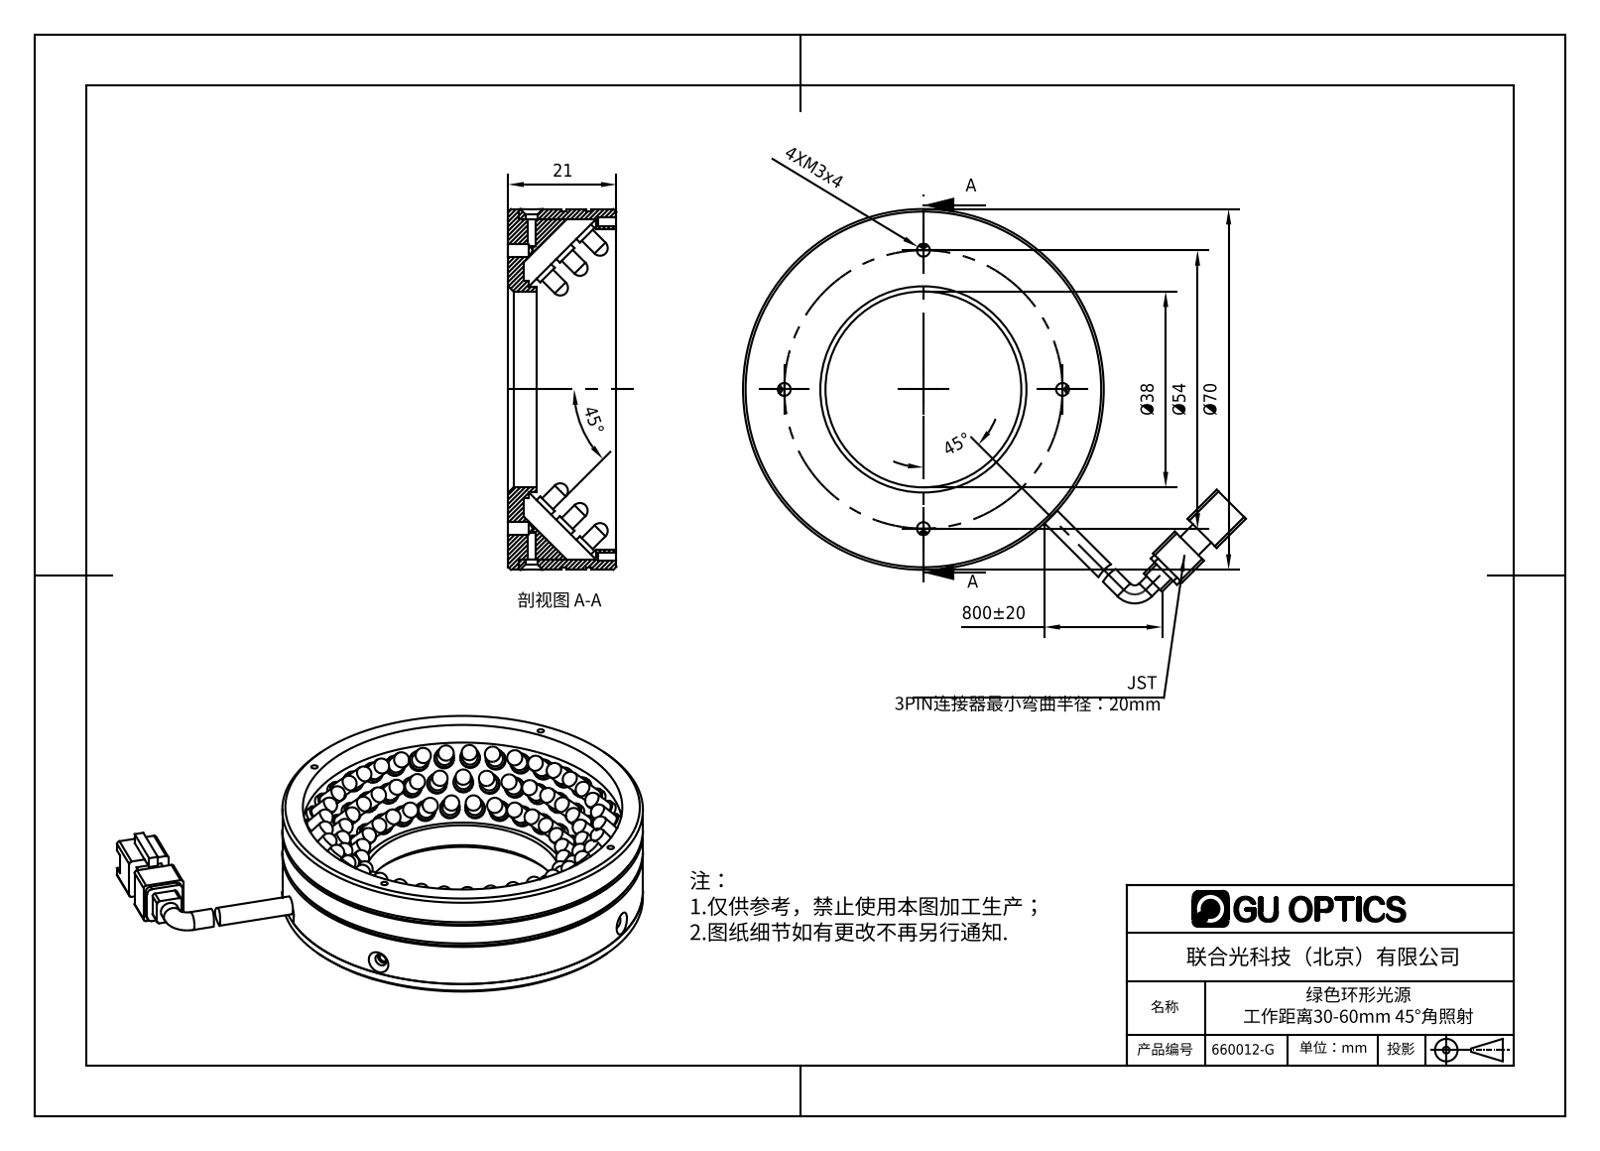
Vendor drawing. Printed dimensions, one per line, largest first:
800±20
Ø70
Ø54
45°
45°
Ø38
21
4XM3x4
